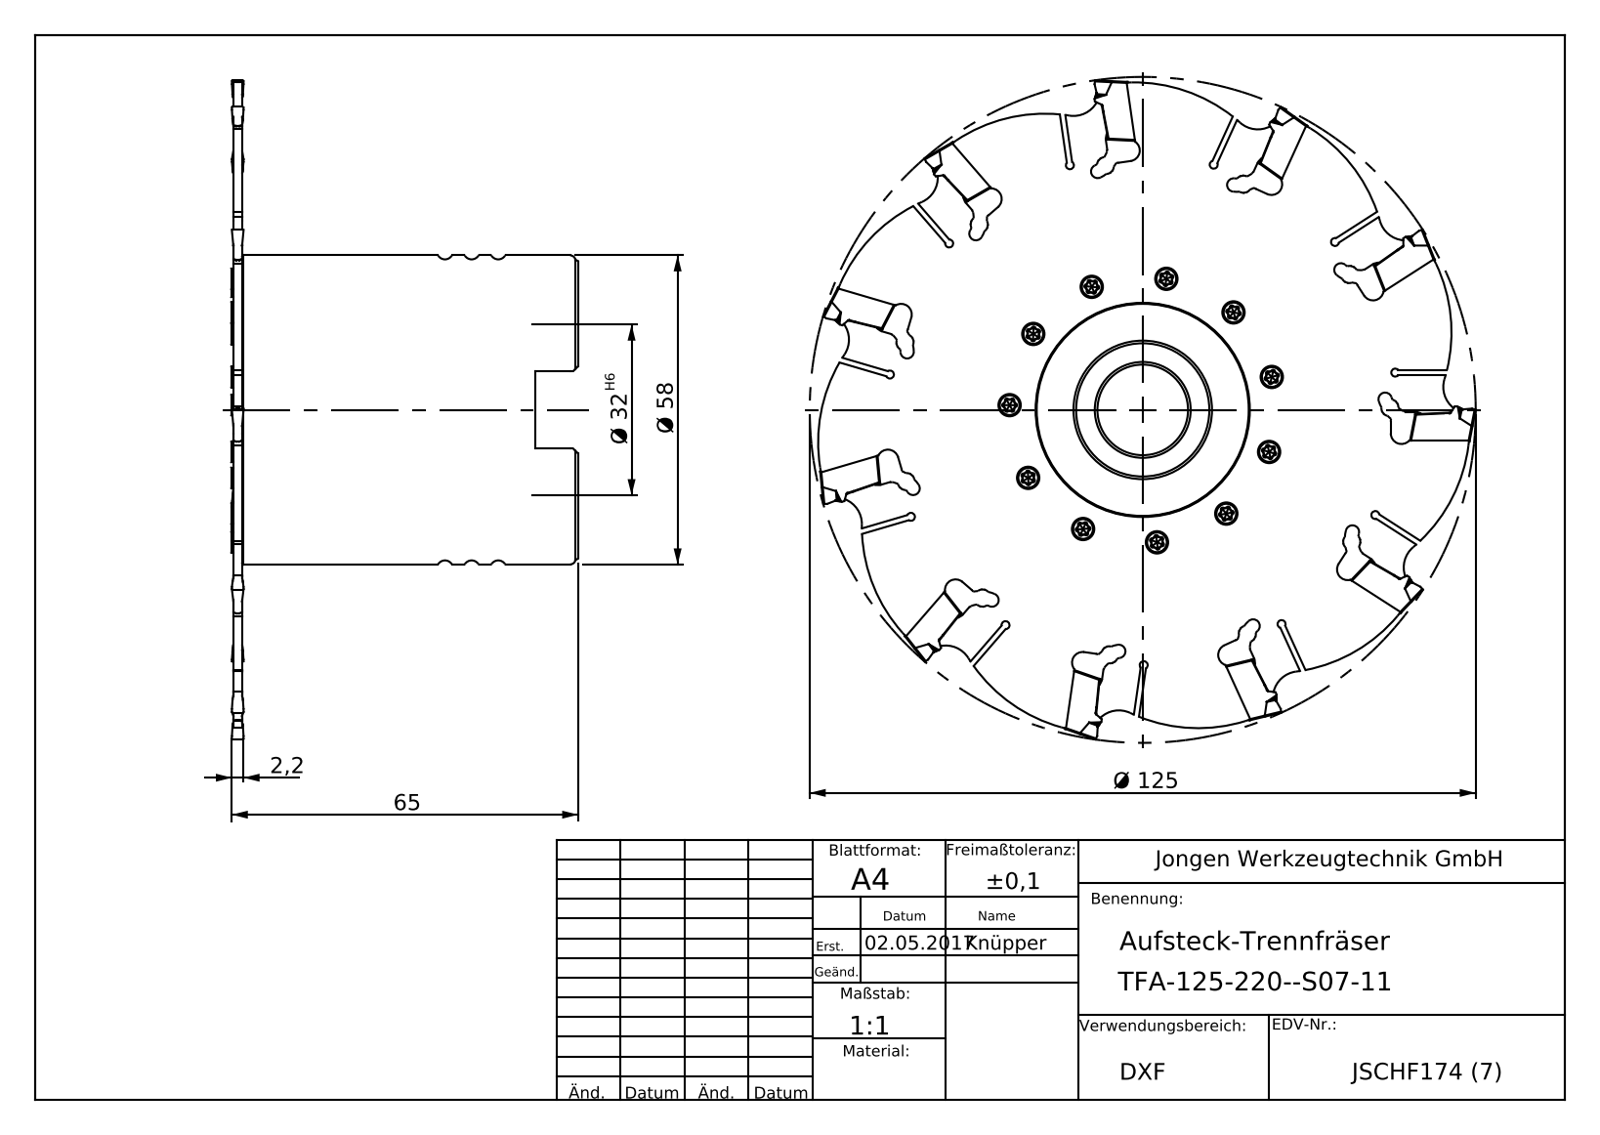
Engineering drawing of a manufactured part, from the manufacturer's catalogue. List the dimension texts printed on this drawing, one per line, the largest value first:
Ø 125
65
Ø 58
Ø 32 H6
2,2
